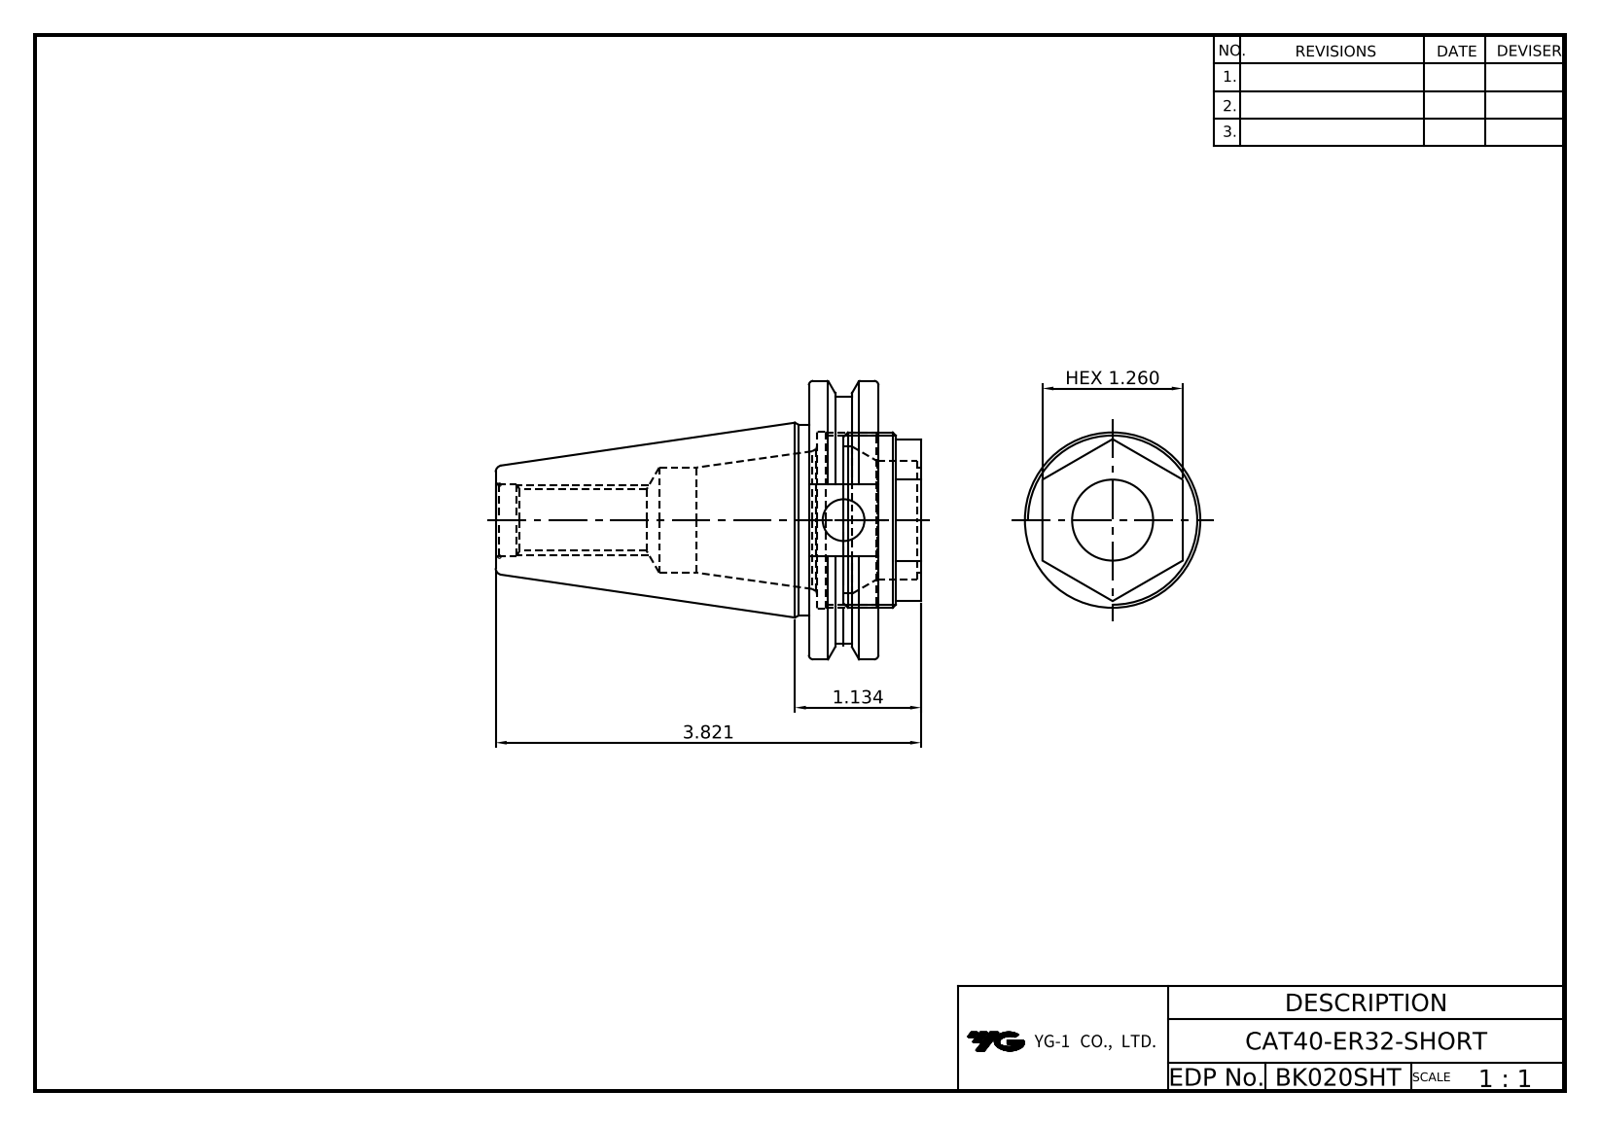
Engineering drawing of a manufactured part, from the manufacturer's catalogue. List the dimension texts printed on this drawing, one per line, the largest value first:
3.821
HEX 1.260
1.134
